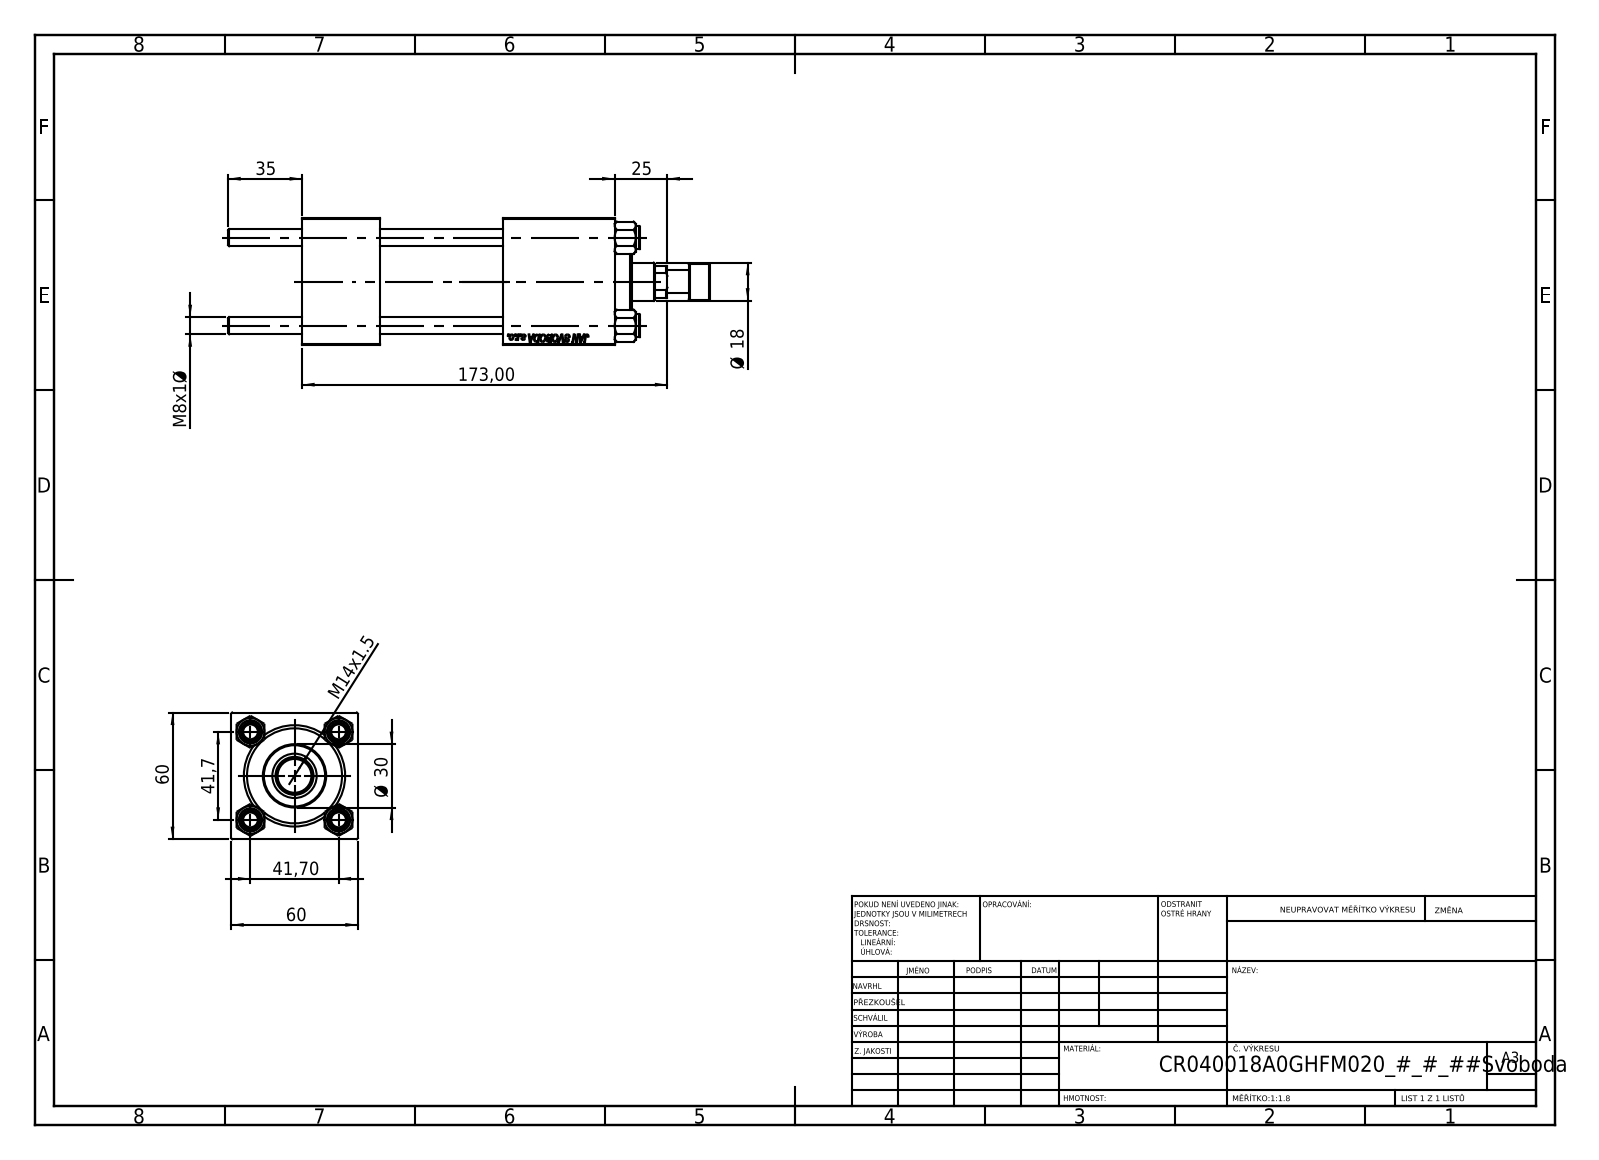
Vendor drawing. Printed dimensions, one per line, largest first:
173,00
60
60
41,7
41,70
35
Ø 30
25
Ø 18
M14x1.5
M8x1 Ø
